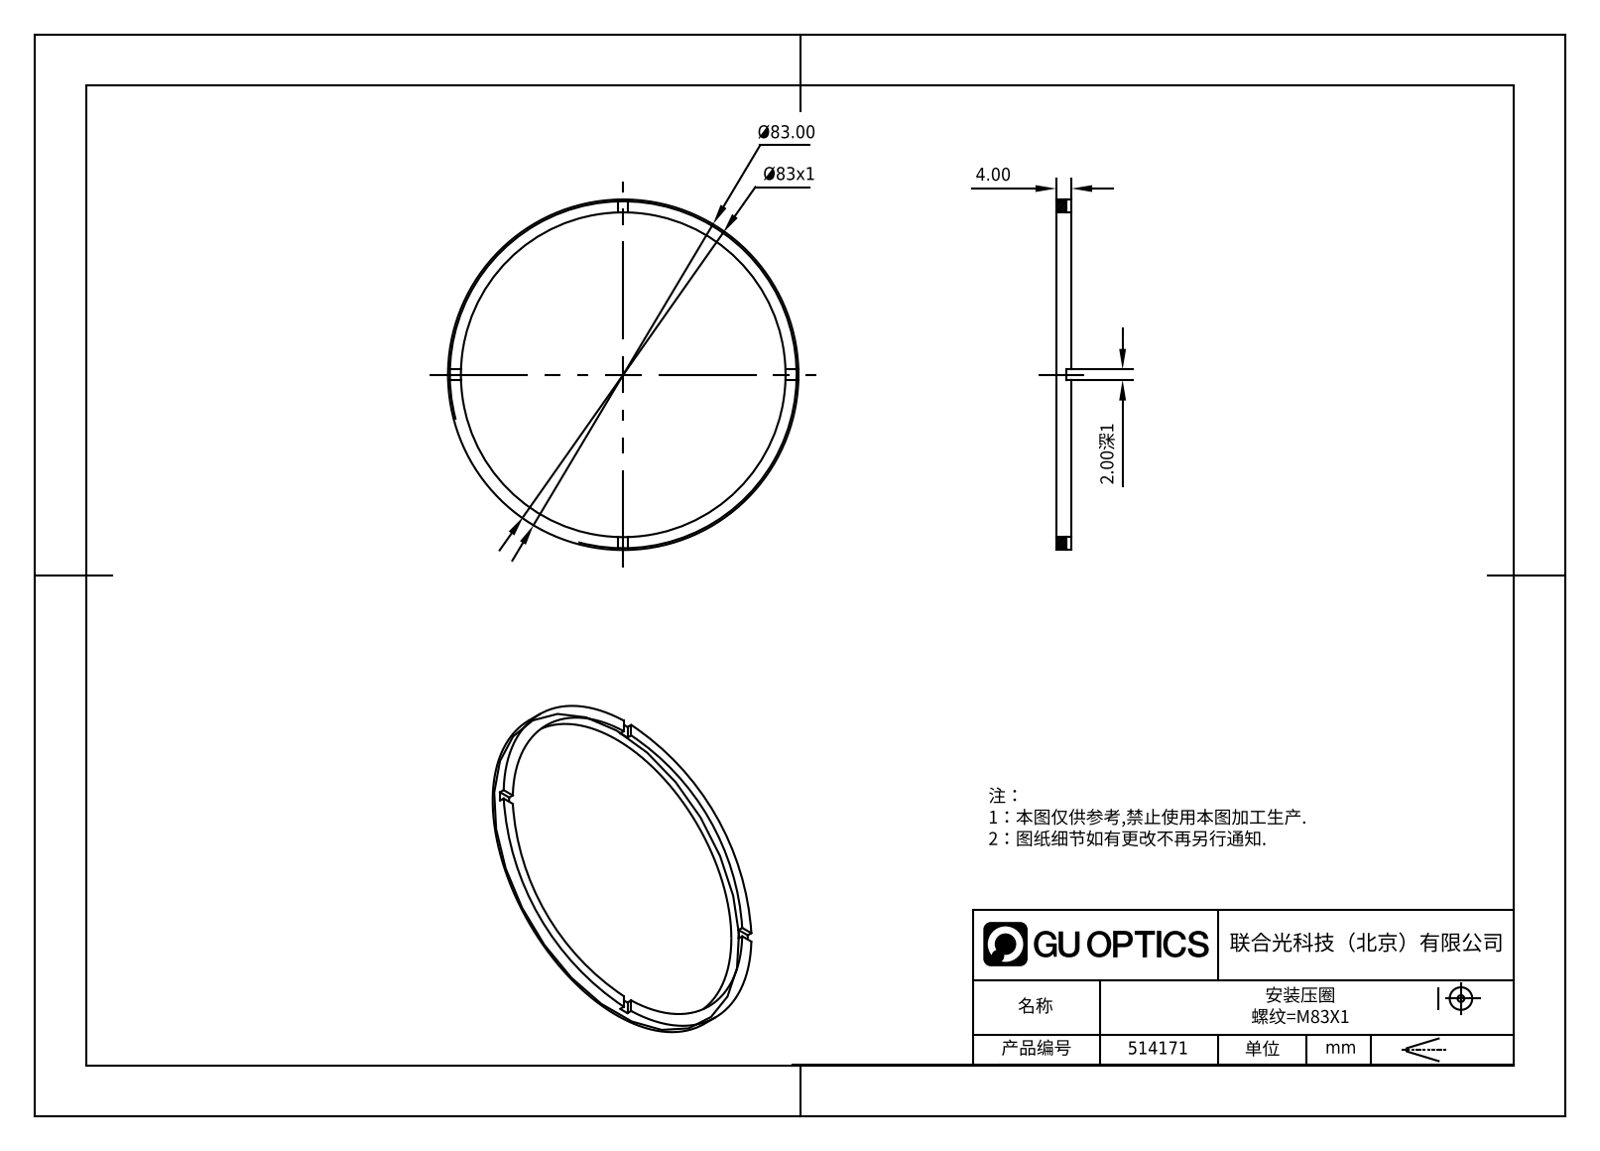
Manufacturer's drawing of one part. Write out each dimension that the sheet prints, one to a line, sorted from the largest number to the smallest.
Ø83.00
Ø83x1
4.00
2.00深1
